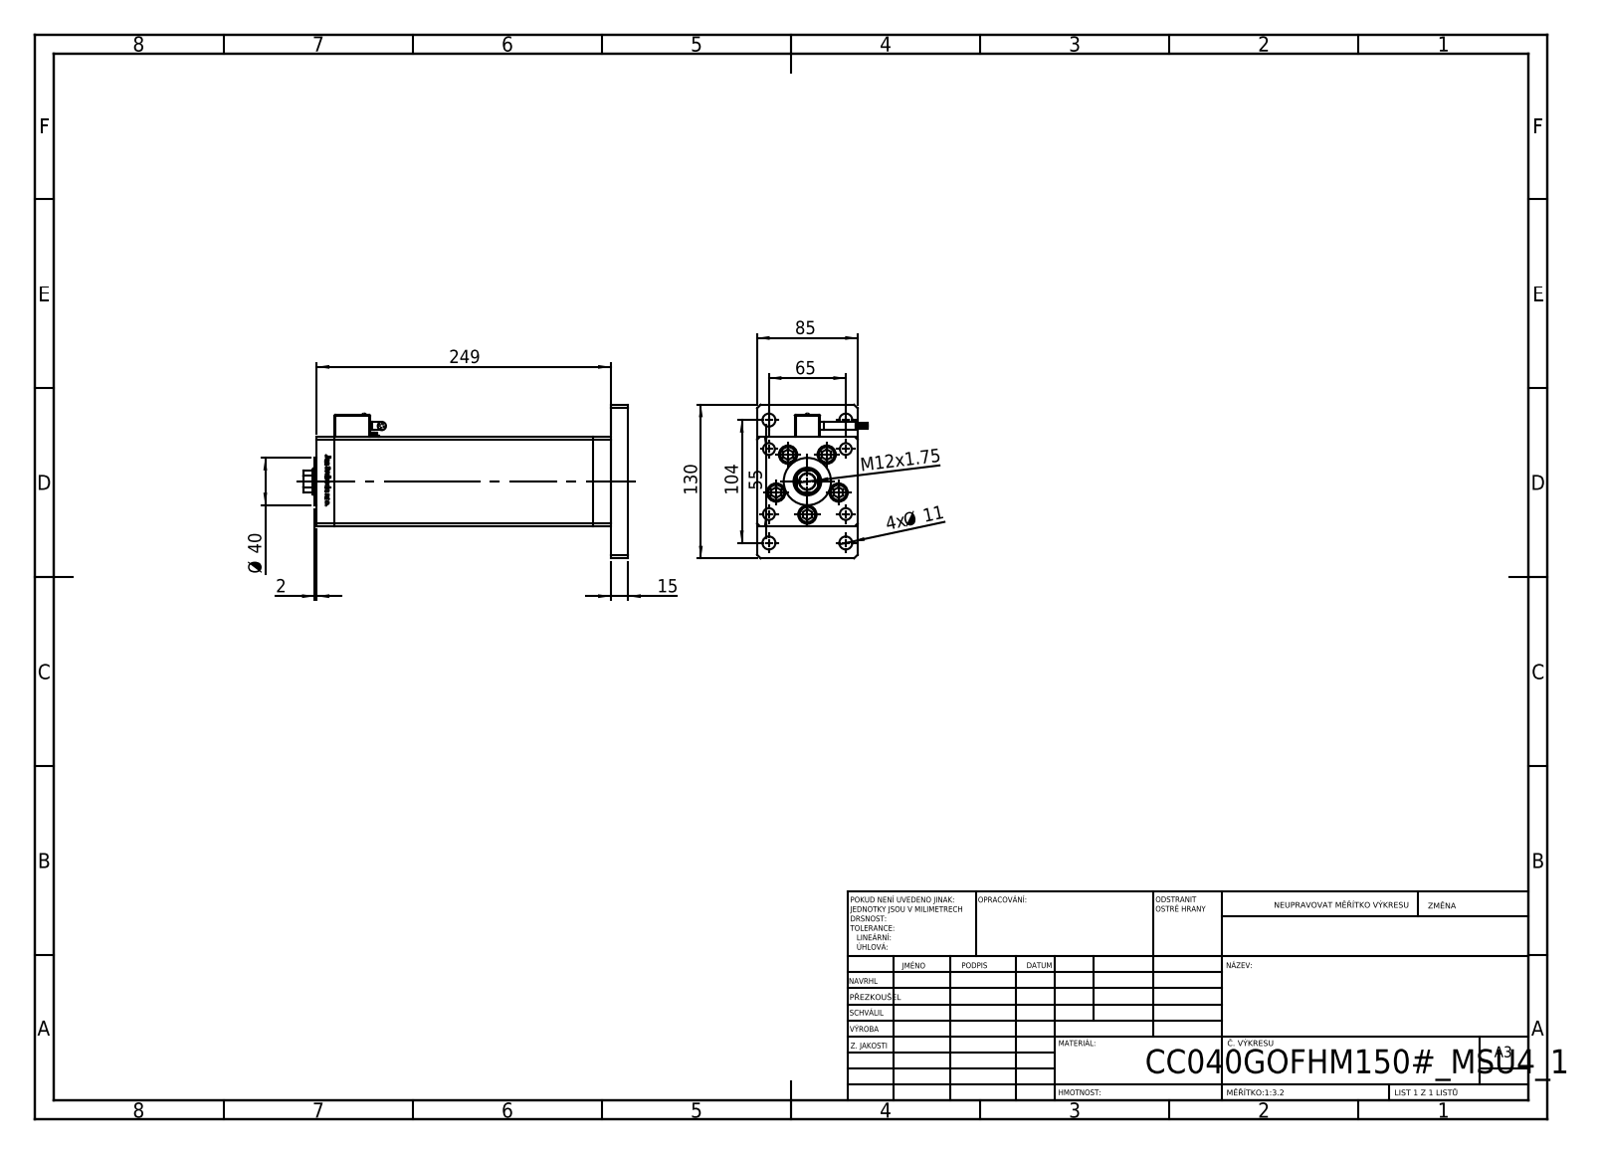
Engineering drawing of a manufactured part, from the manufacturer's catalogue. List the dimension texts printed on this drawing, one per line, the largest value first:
249
130
104
85
65
55
Ø 40
15
M12x1.75
4x Ø 11
2
